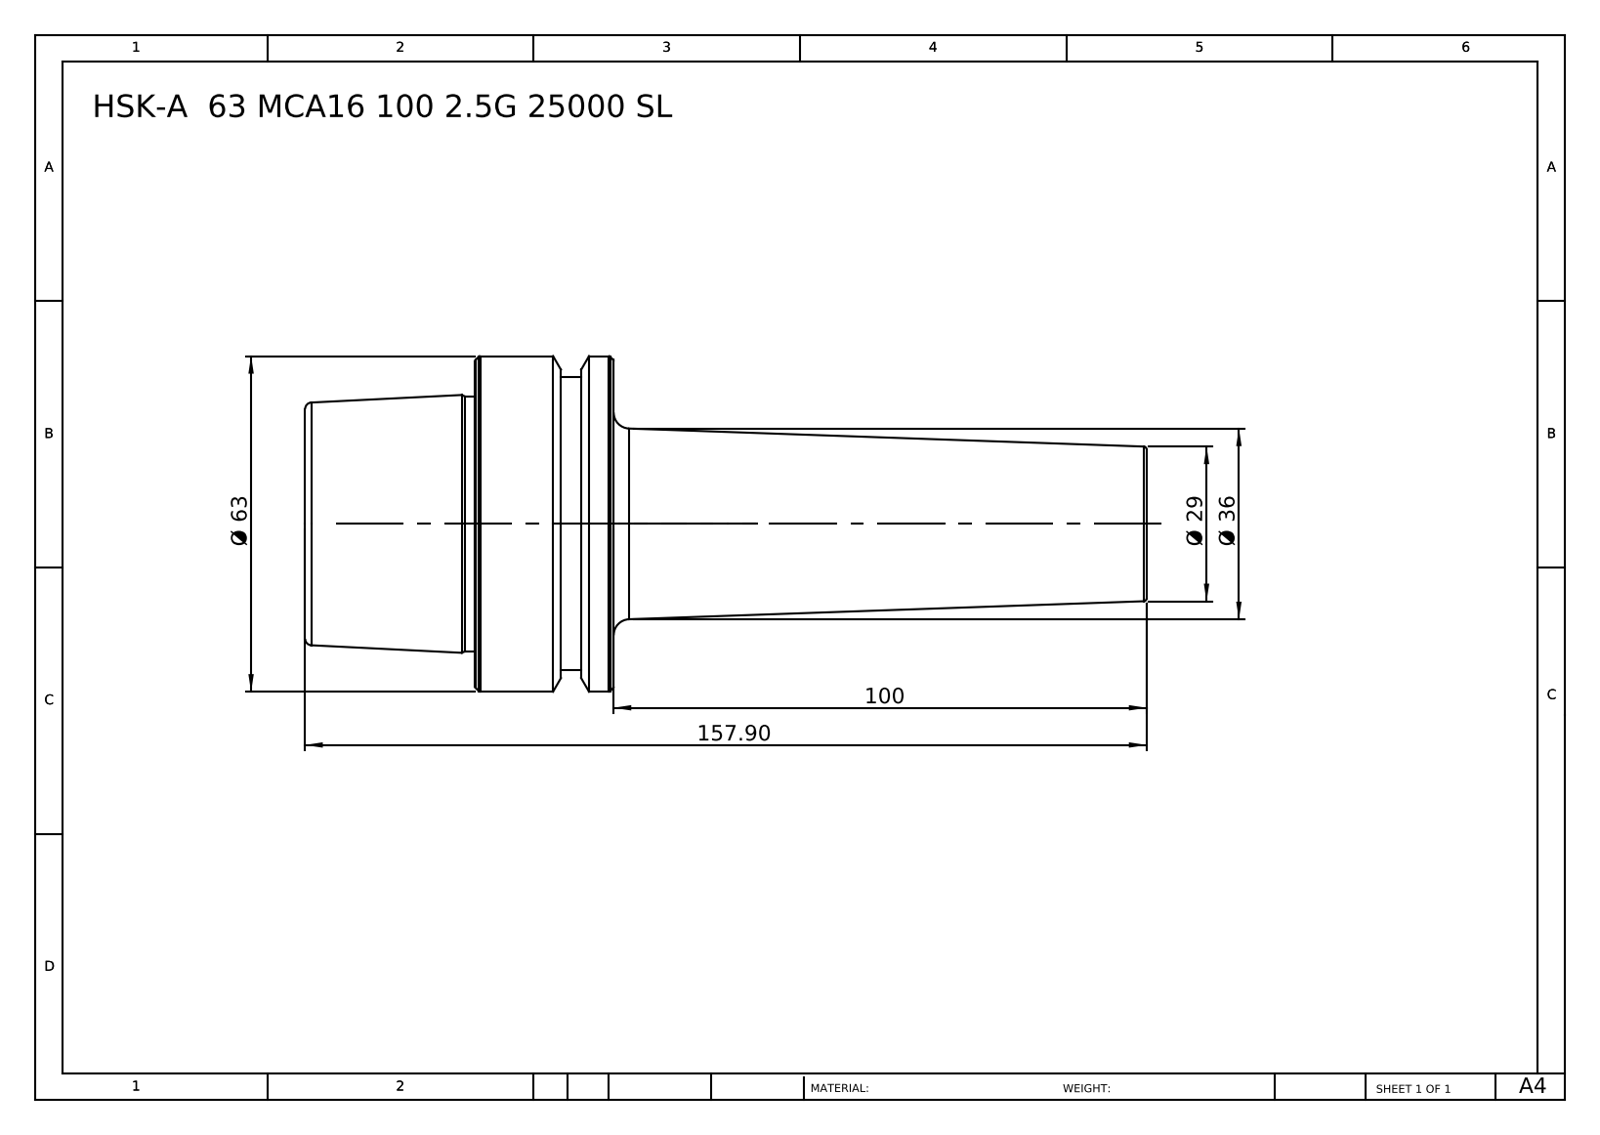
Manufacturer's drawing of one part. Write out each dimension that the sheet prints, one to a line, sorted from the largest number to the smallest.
157.90
100
Ø 63
Ø 36
Ø 29
